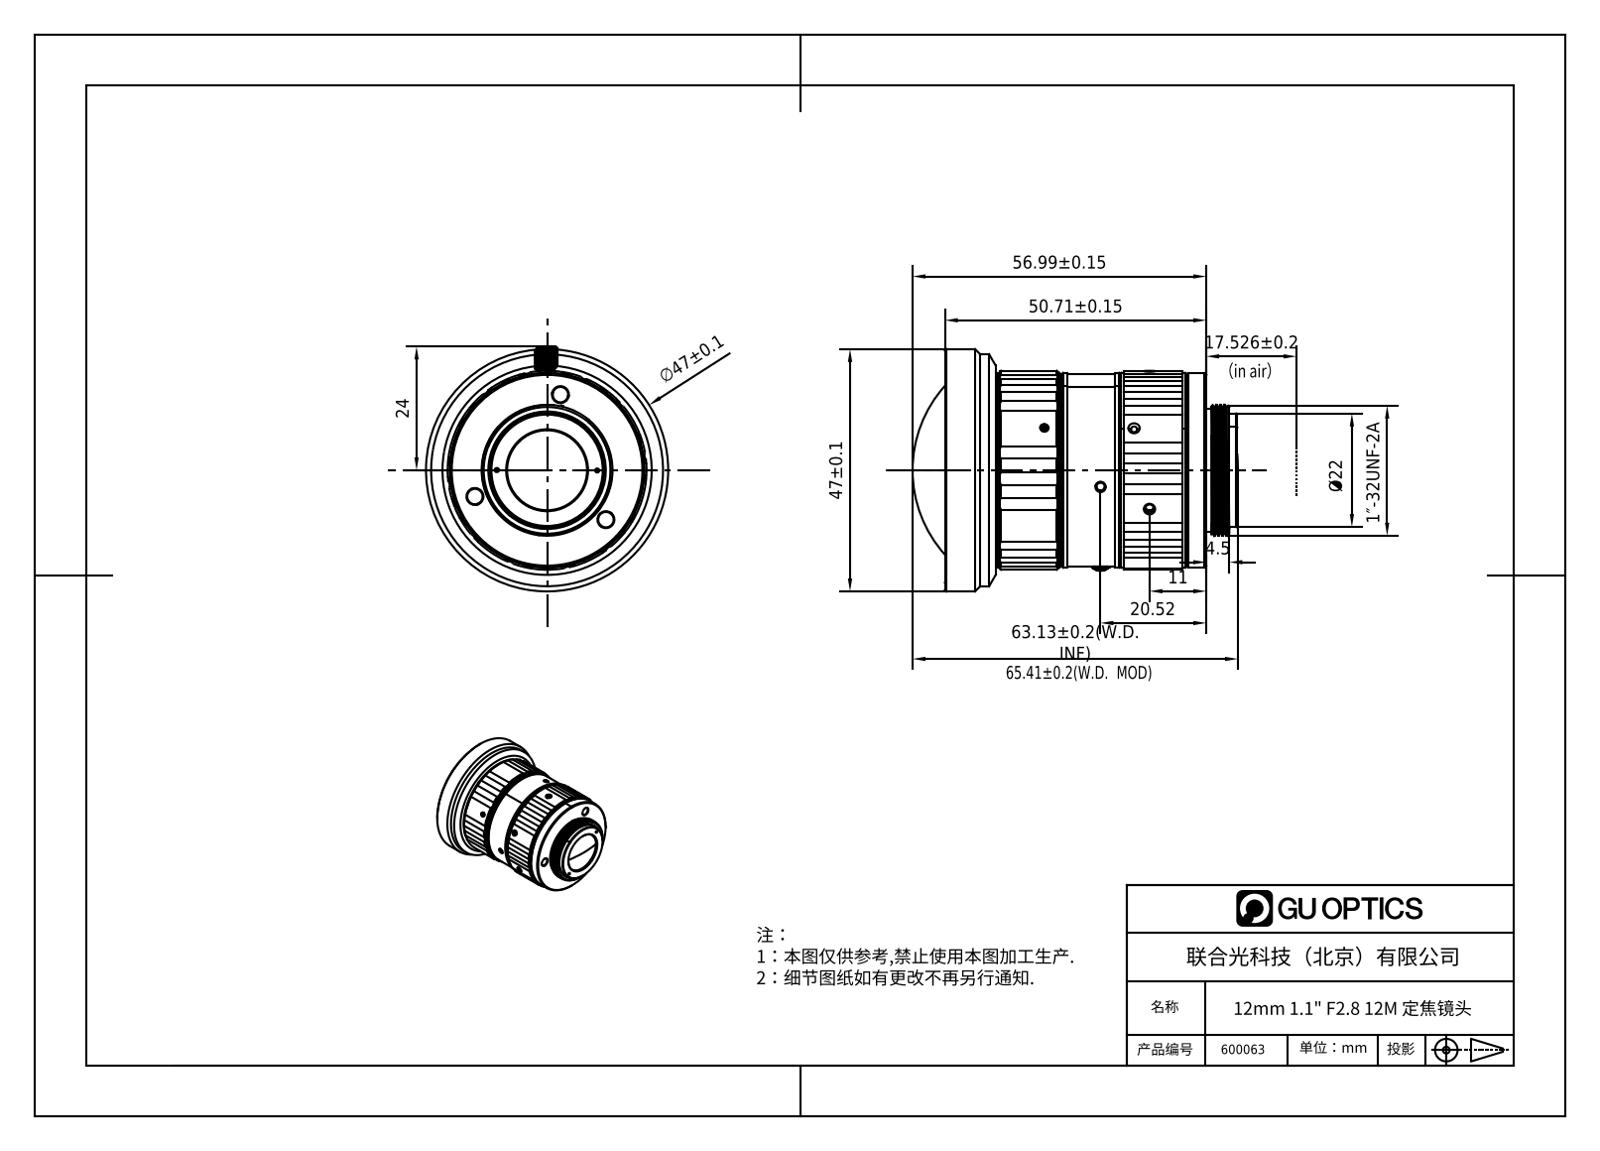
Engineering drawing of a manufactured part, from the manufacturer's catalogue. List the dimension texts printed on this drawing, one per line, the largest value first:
63.13±0.2(W.D. INF)
56.99±0.15
50.71±0.15
47±0.1
∅47±0.1
24
Ø22
20.52
17.526±0.2
11
4.5
1″-32UNF-2A
